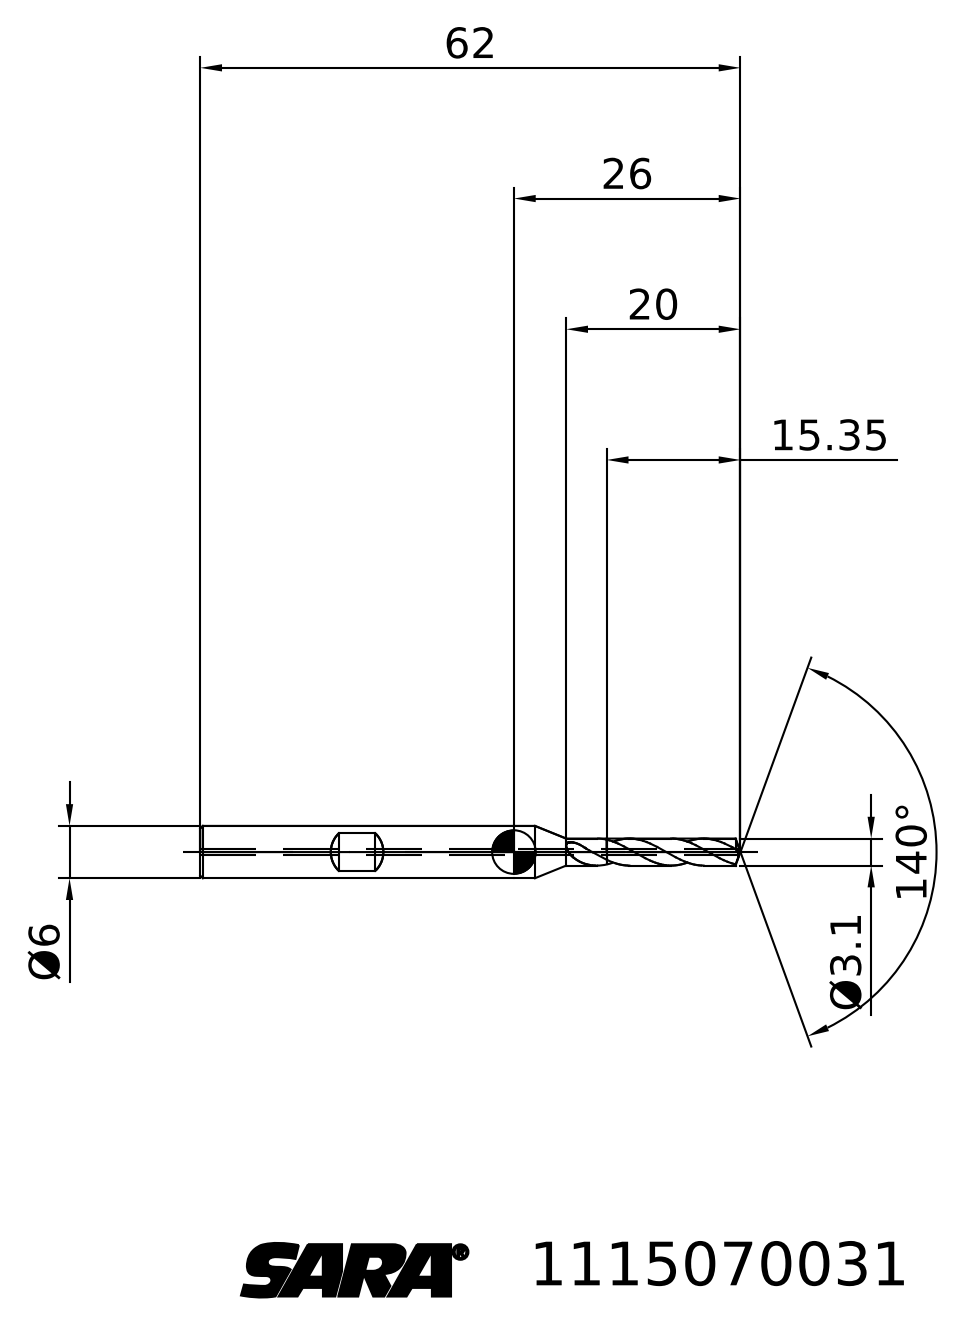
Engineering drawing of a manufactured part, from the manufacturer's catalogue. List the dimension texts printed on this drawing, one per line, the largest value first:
140°
62
26
20
15.35
Ø6
Ø3.1
